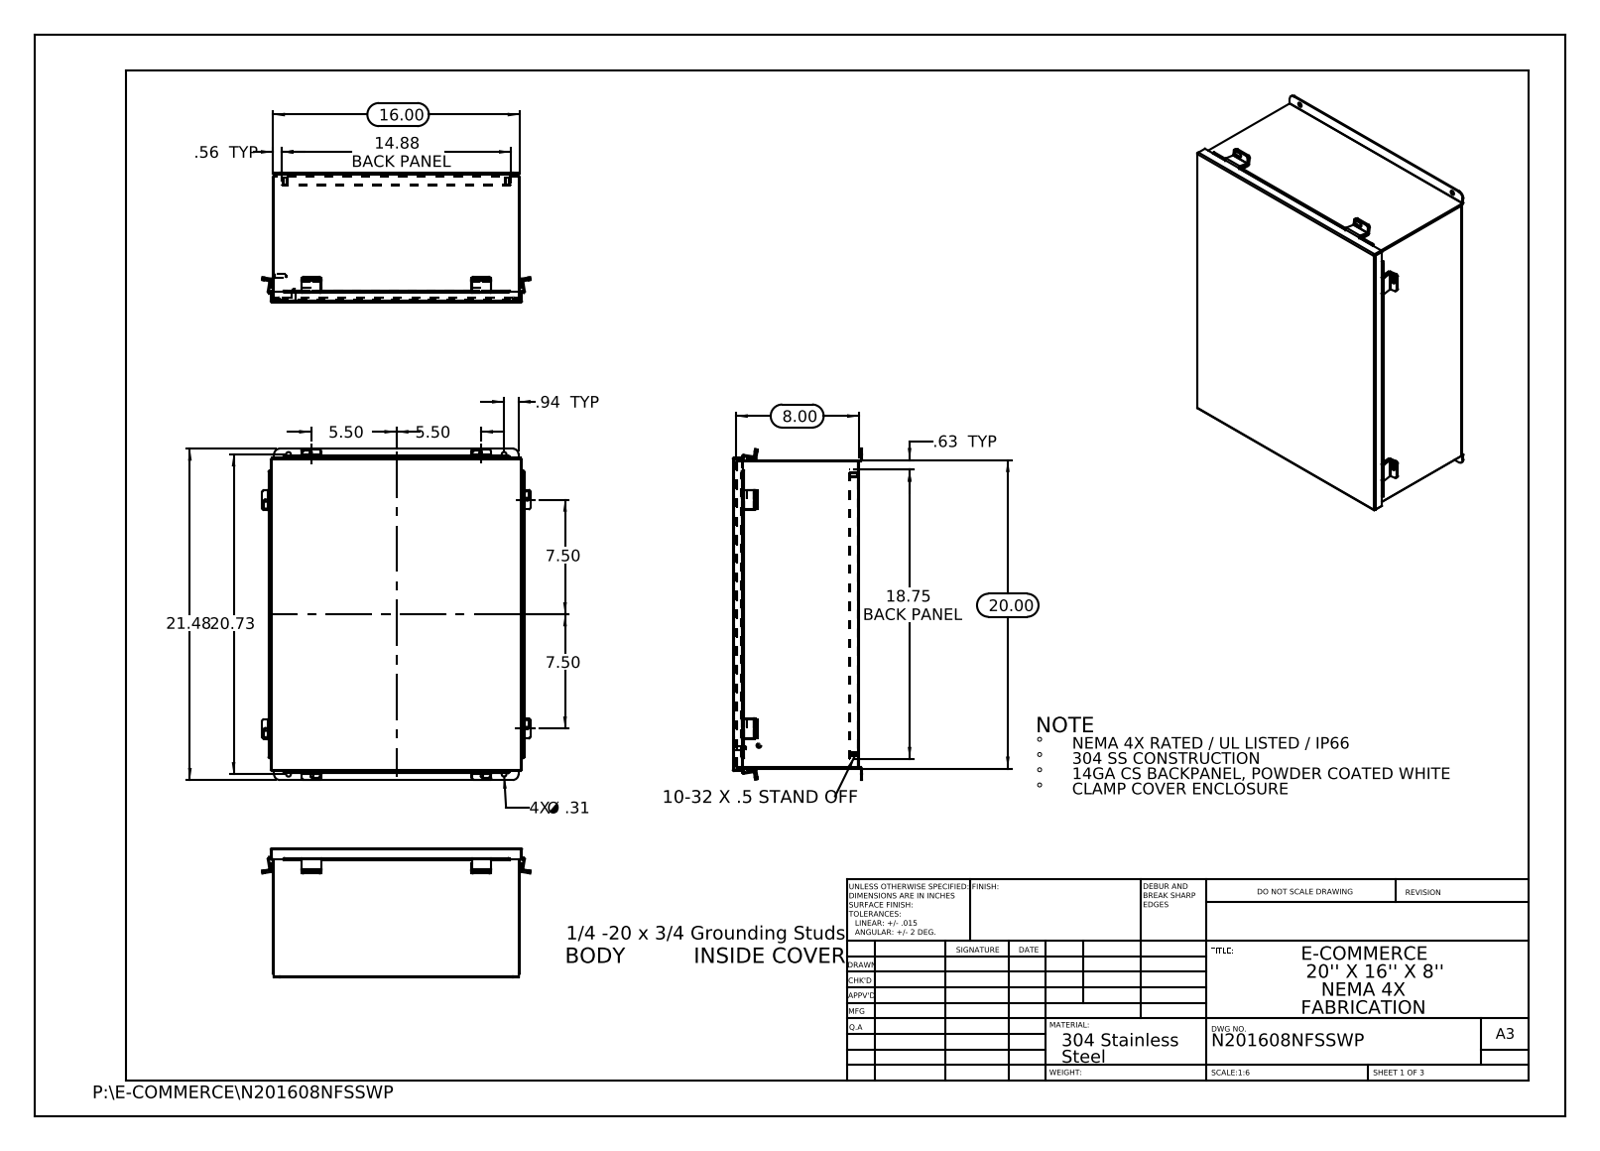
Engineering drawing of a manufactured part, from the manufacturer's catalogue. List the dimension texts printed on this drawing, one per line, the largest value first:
21.48
20.73
20.00
18.75 BACK PANEL
16.00
14.88 BACK PANEL
8.00
7.50
7.50
5.50
5.50
.94 TYP
.63 TYP
.56 TYP
4X Ø .31
